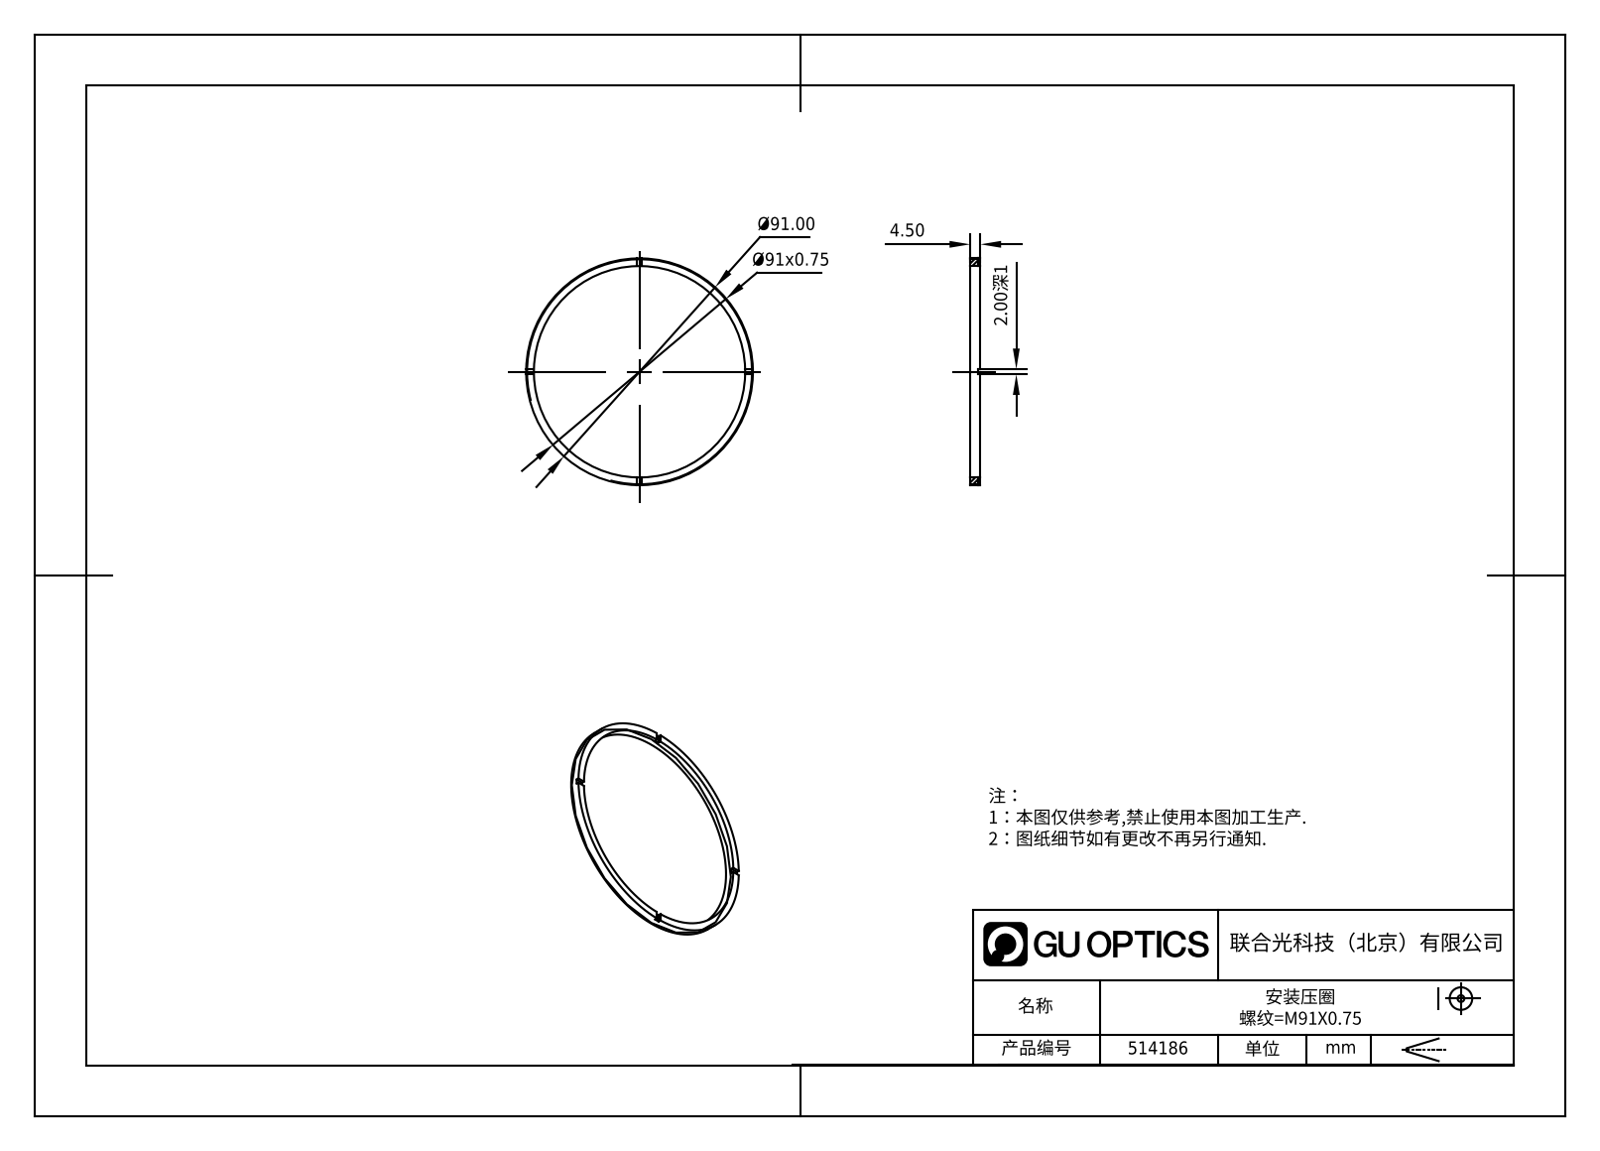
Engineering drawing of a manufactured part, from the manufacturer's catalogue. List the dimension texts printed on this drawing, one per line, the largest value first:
Ø91.00
Ø91x0.75
4.50
2.00深1
